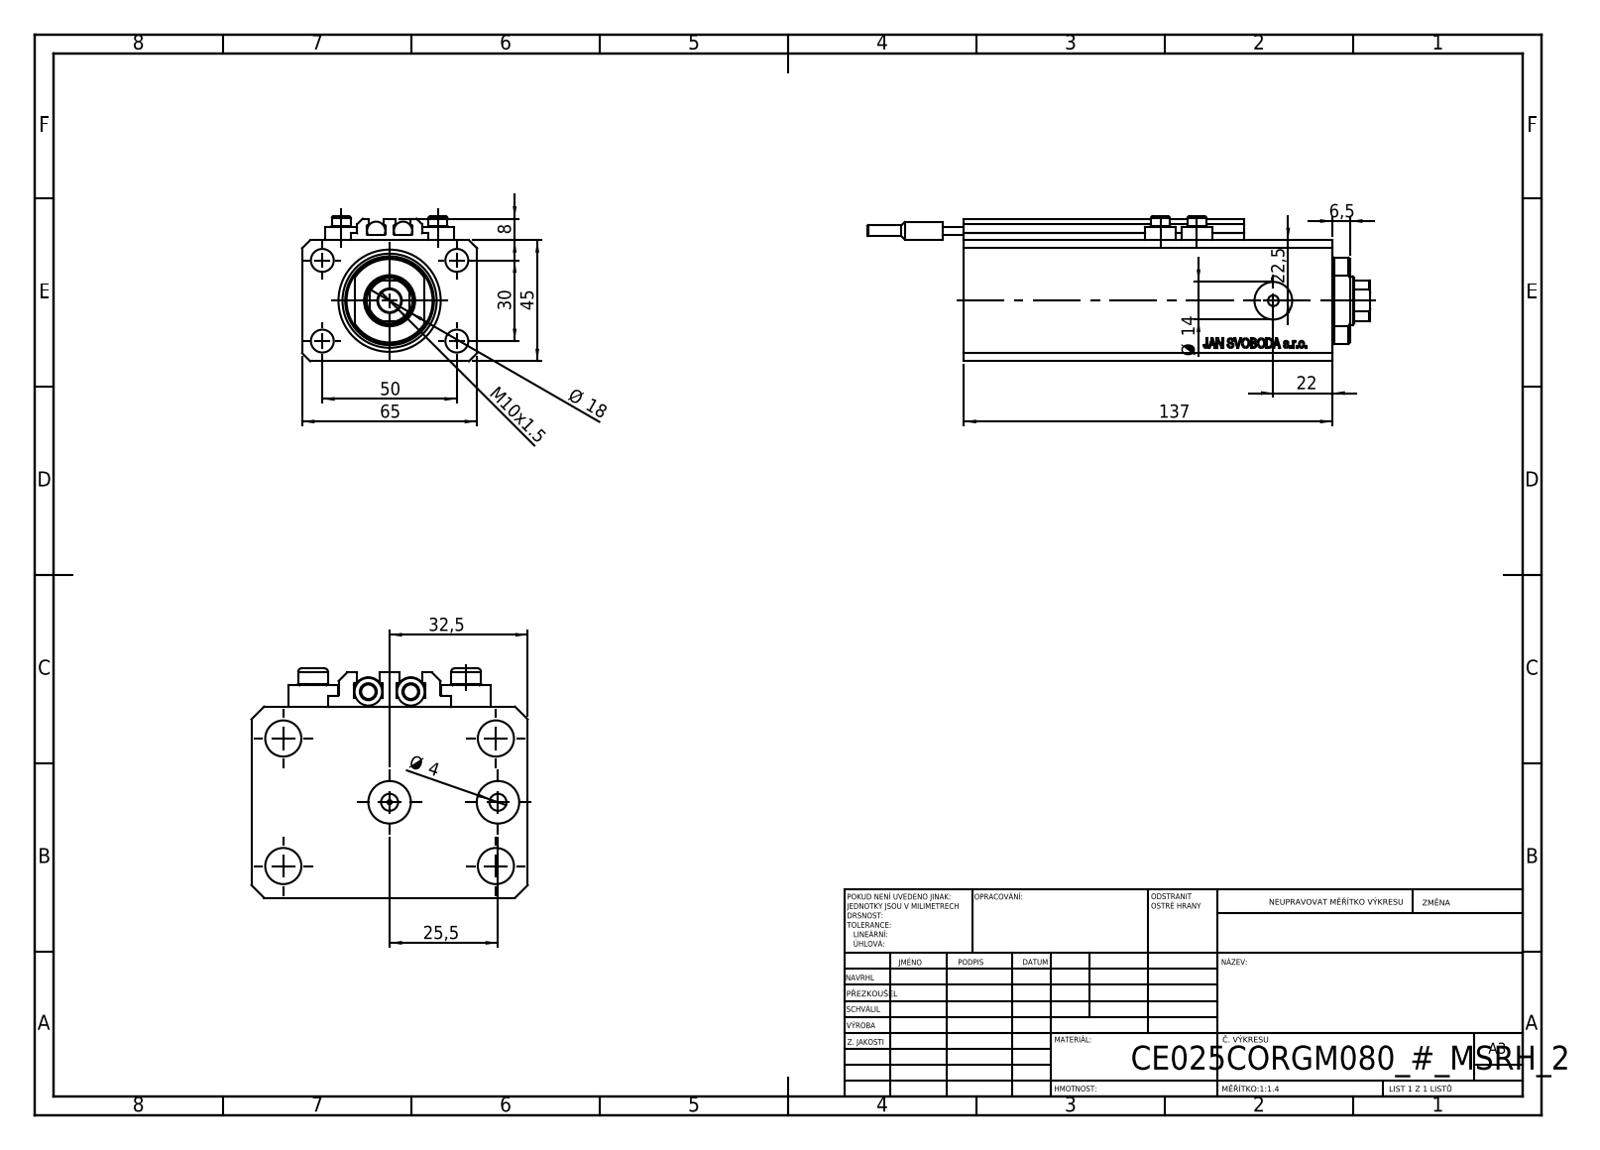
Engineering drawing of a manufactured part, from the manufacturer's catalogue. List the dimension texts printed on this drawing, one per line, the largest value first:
137
65
50
45
32,5
30
25,5
22,5
22
Ø 18
Ø 14
M10x1.5
8
6,5
Ø 4
